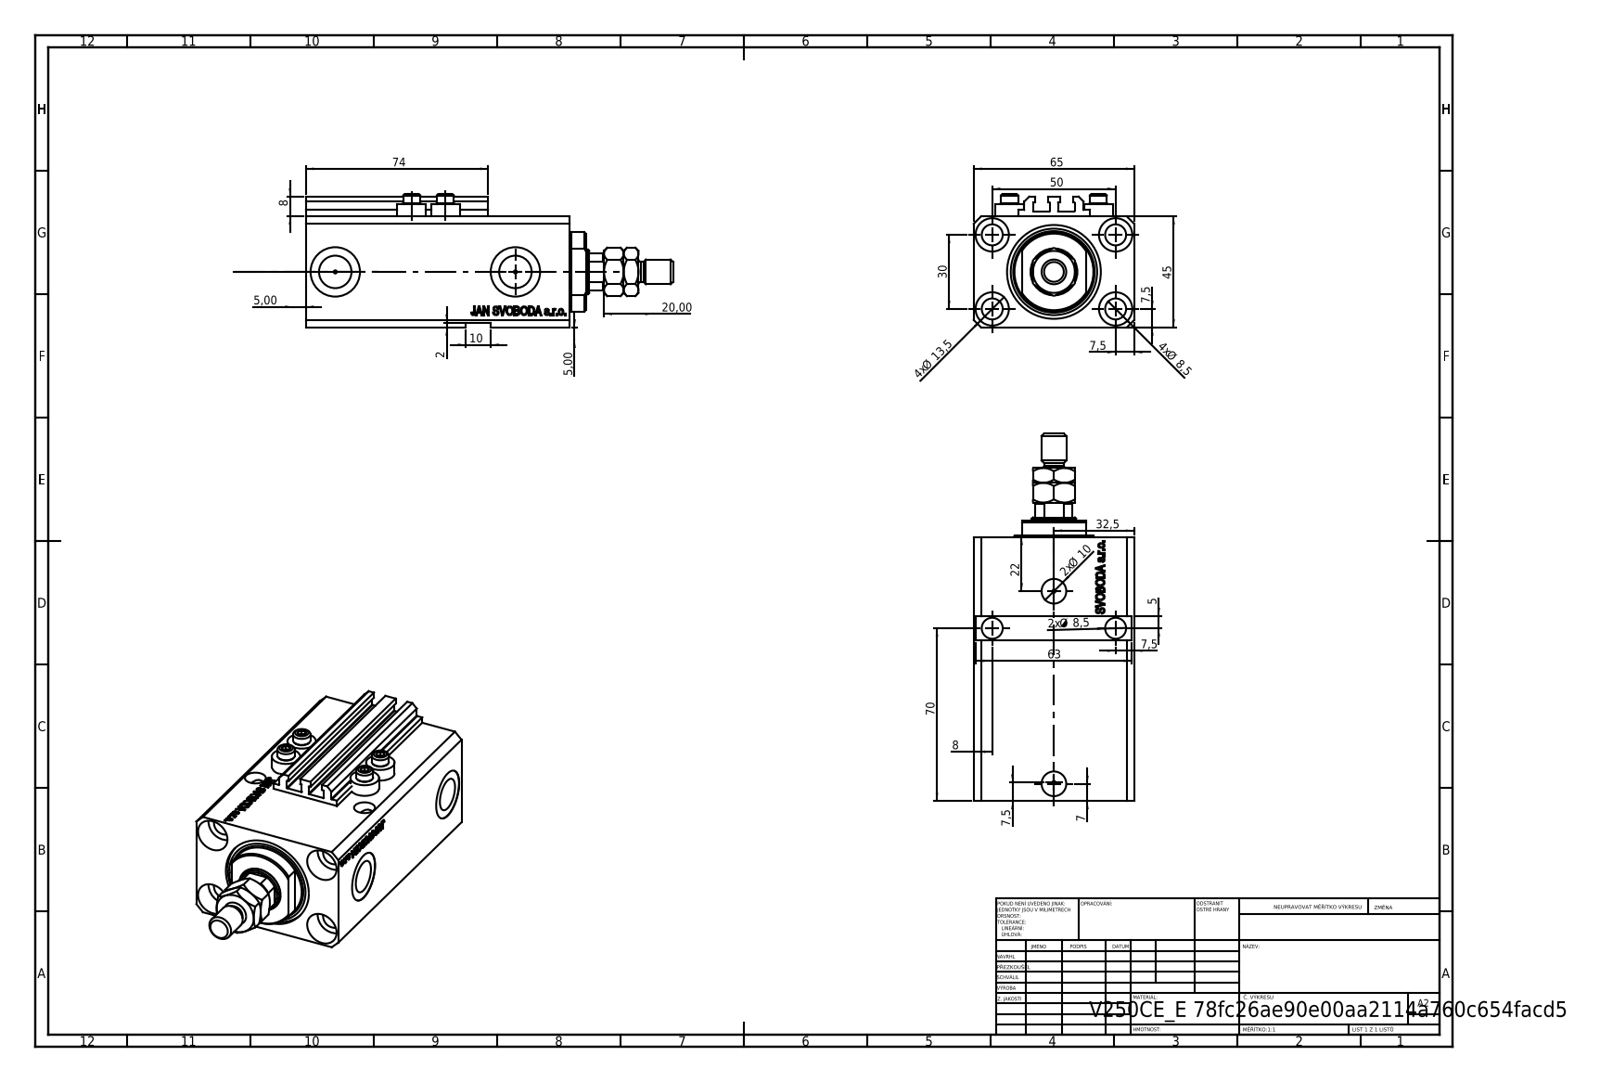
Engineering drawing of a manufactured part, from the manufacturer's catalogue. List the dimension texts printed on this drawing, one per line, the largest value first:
74
70
65
63
50
45
32,5
30
22
20,00
4x Ø 13,5
10
2x Ø 10
4x Ø 8,5
2x Ø 8,5
8
8
7,5
7,5
7,5
7,5
7
5,00
5,00
5
2
